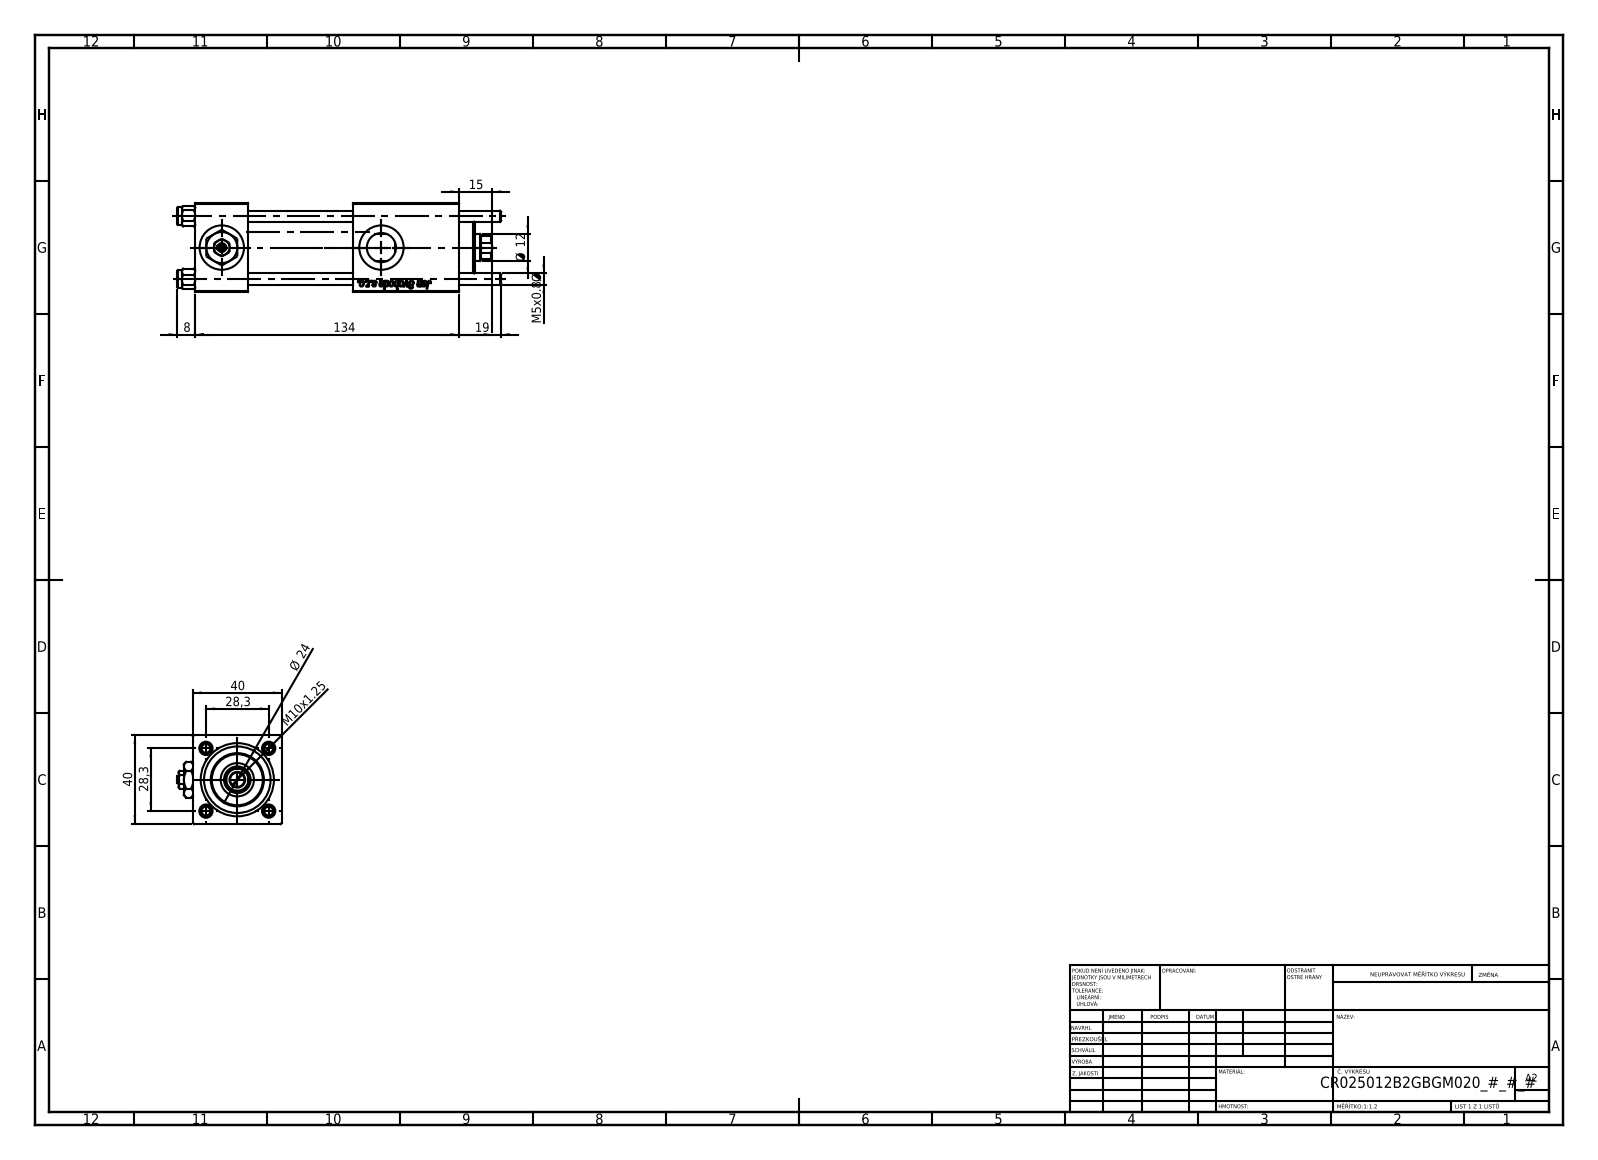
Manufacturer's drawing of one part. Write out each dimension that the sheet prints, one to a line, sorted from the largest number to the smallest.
134
40
40
28,3
28,3
Ø 24
19
15
Ø 12
M10x1.25
8
M5x0.8 Ø
